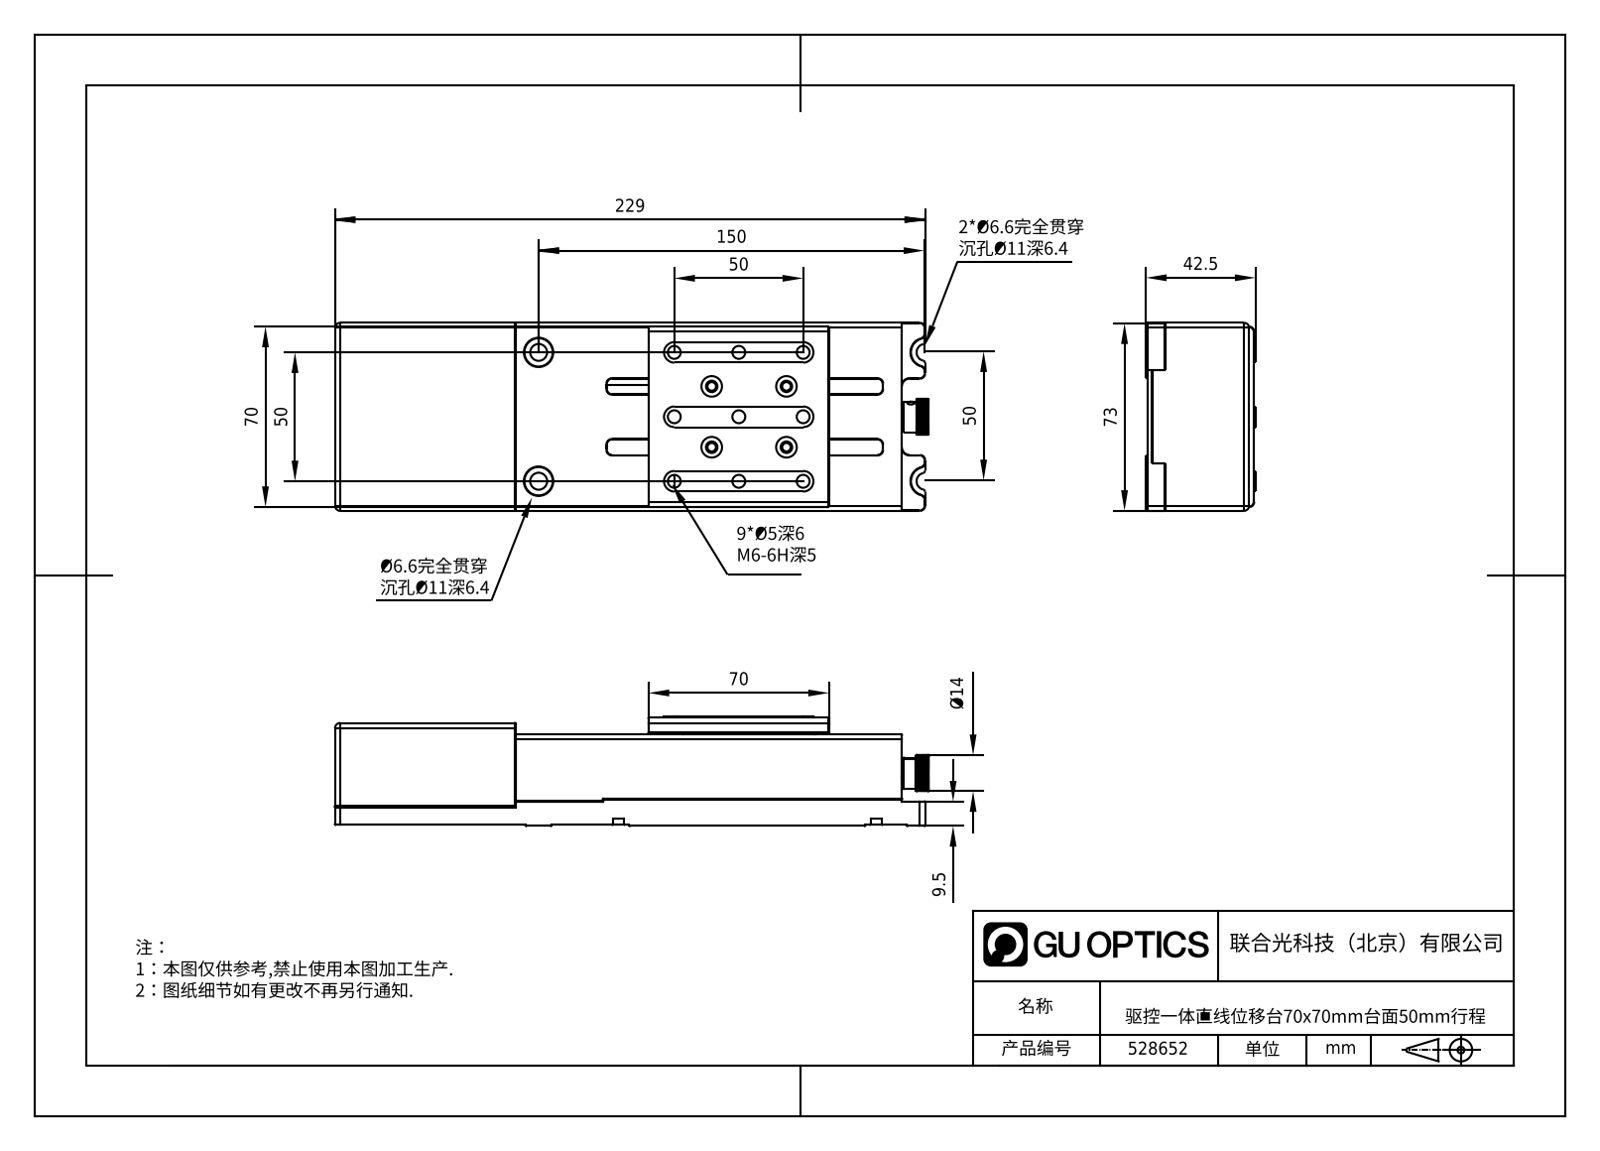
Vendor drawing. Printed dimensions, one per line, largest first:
229
150
73
70
70
50
50
50
42.5
Ø14
9.5
